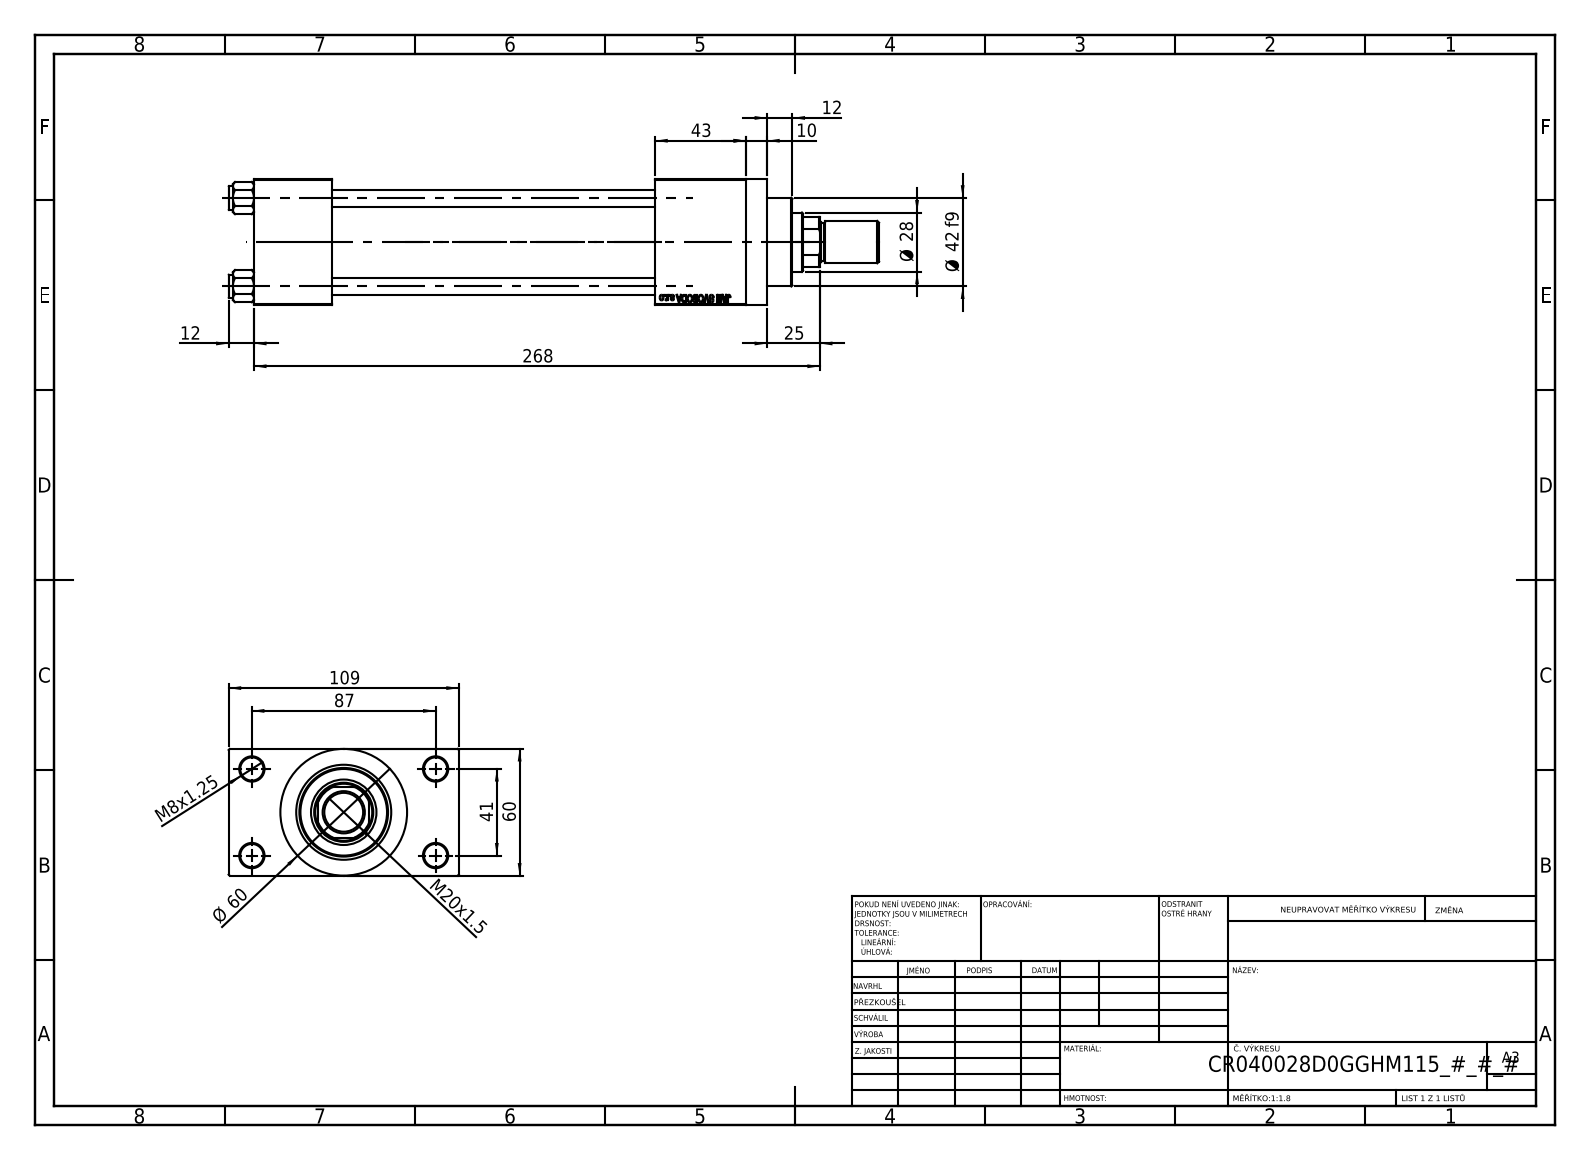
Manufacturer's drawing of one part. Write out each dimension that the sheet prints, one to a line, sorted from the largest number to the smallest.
268
109
87
Ø 60
60
43
Ø 42 f9
41
Ø 28
25
M20x1.5
12
12
10
M8x1.25
